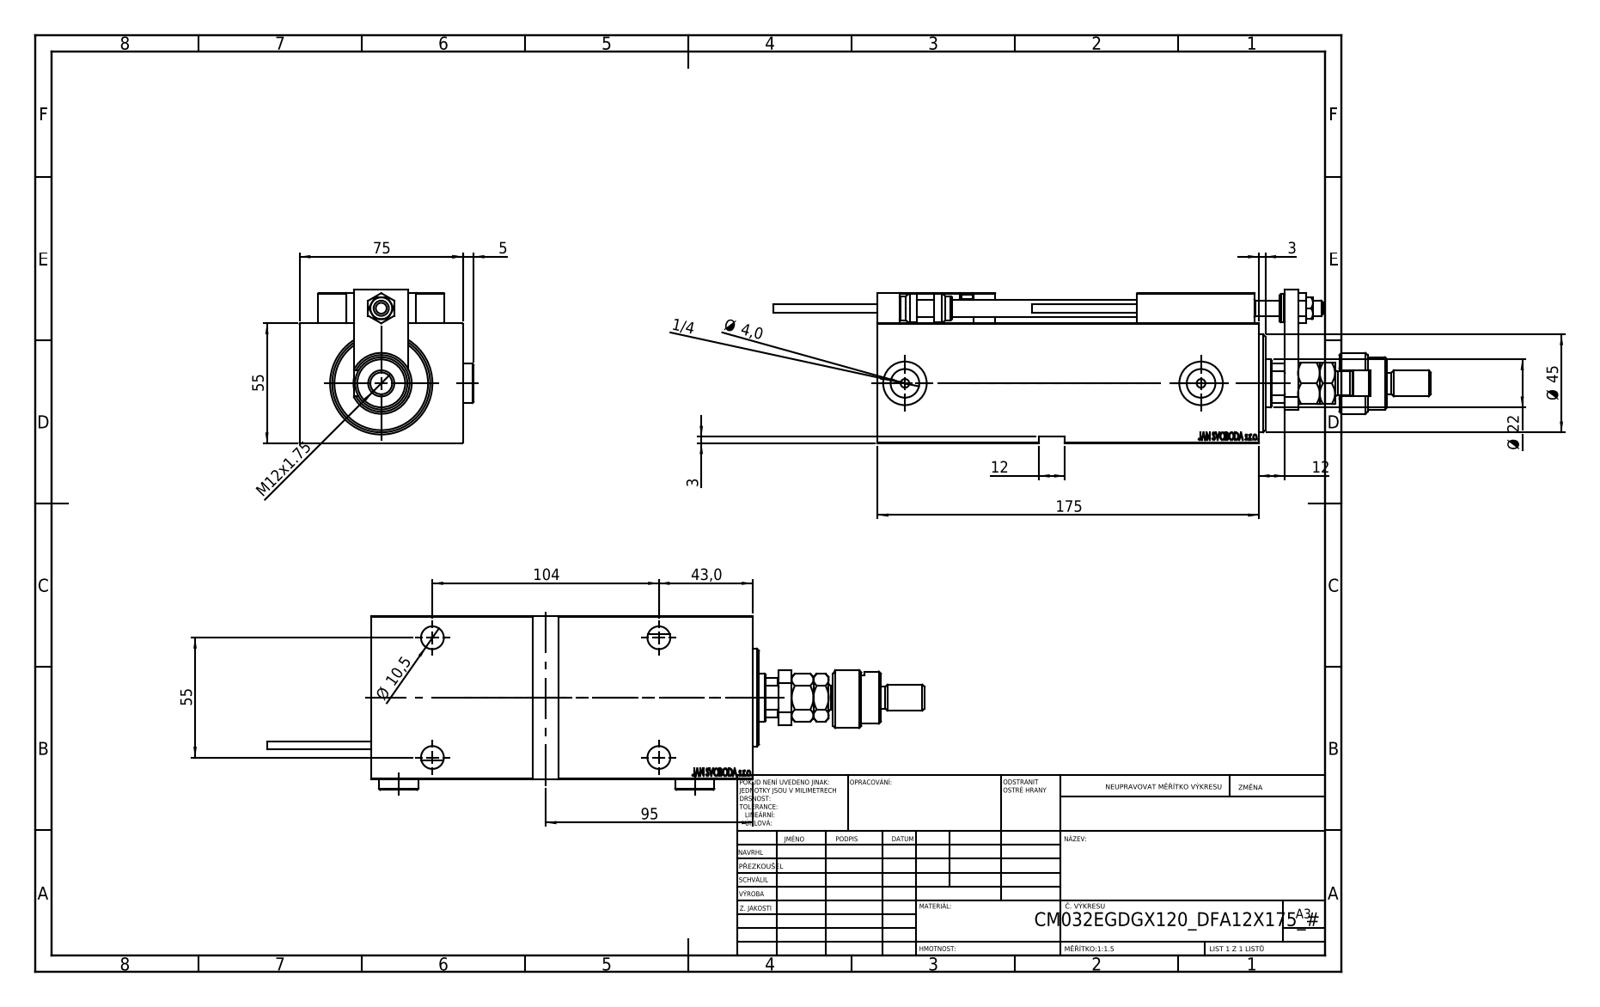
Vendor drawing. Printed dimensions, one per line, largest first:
175
104
95
75
55
55
Ø 45
43,0
Ø 22
M12x1.75
12
12
Ø 10,5
5
Ø 4,0
3
3
1/4
